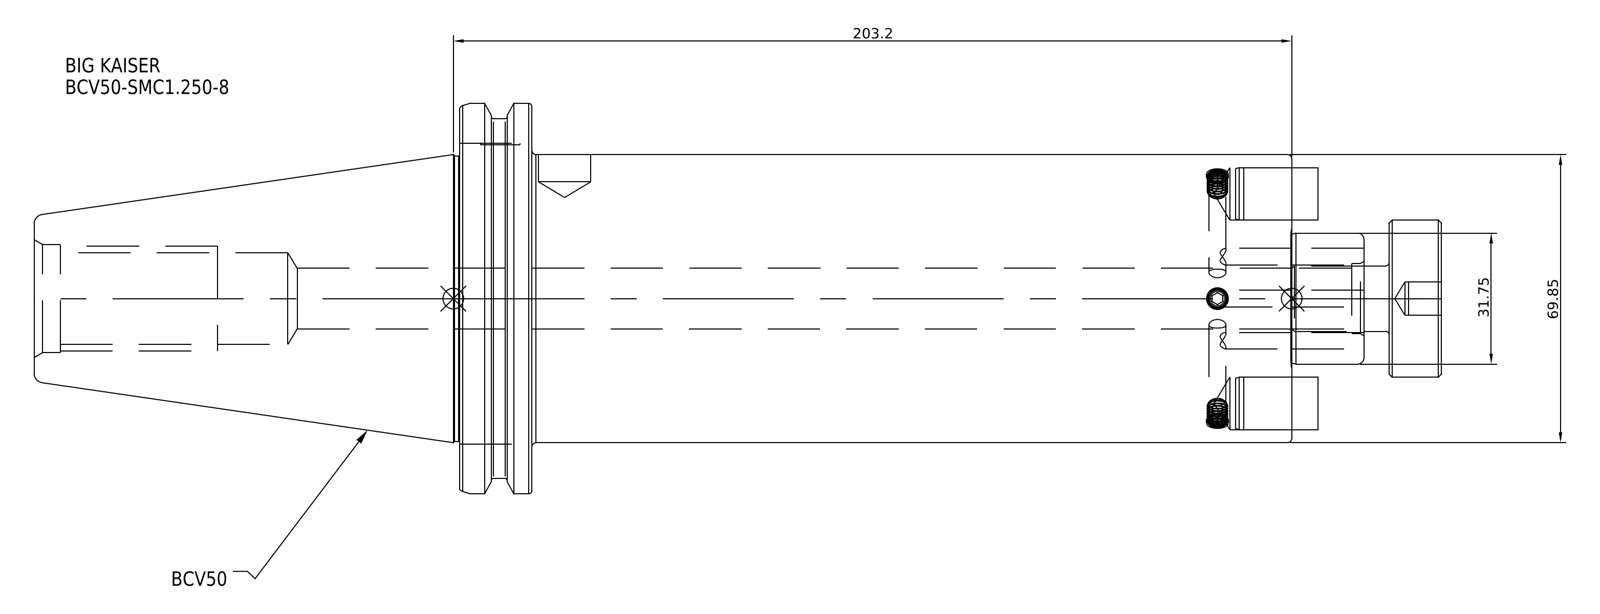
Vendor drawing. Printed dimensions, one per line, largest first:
203.2
69.85
31.75
